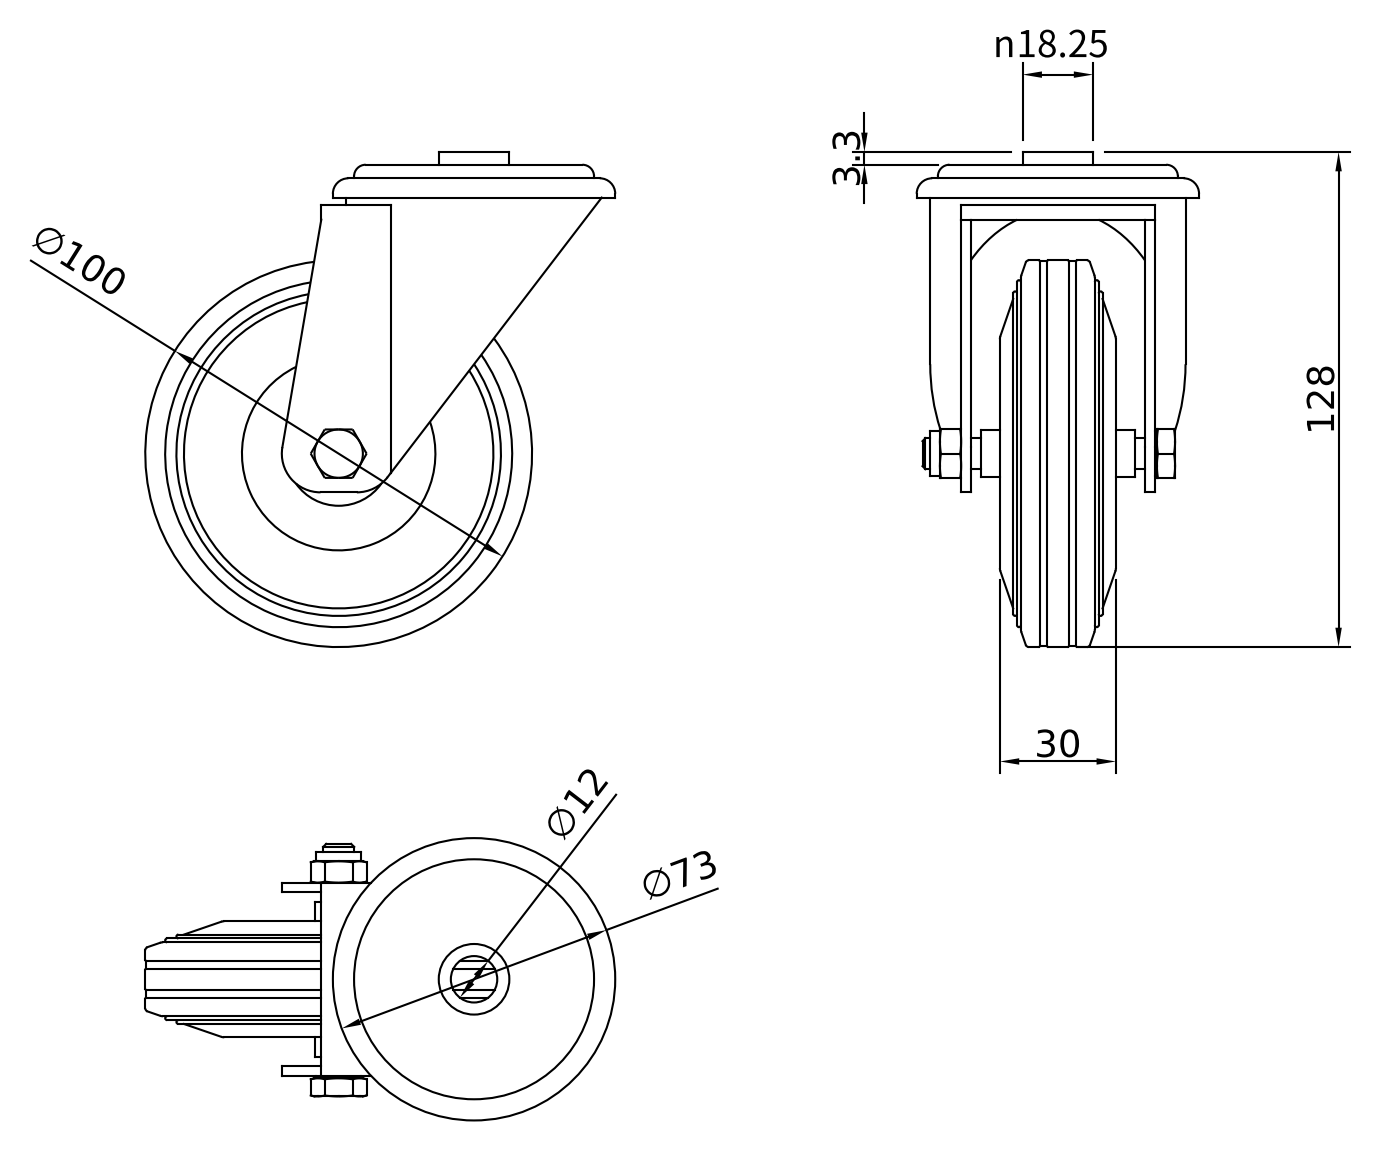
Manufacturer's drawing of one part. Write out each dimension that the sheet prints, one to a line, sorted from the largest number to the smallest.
128
∅100
∅73
30
n18.25
∅12
3.3
